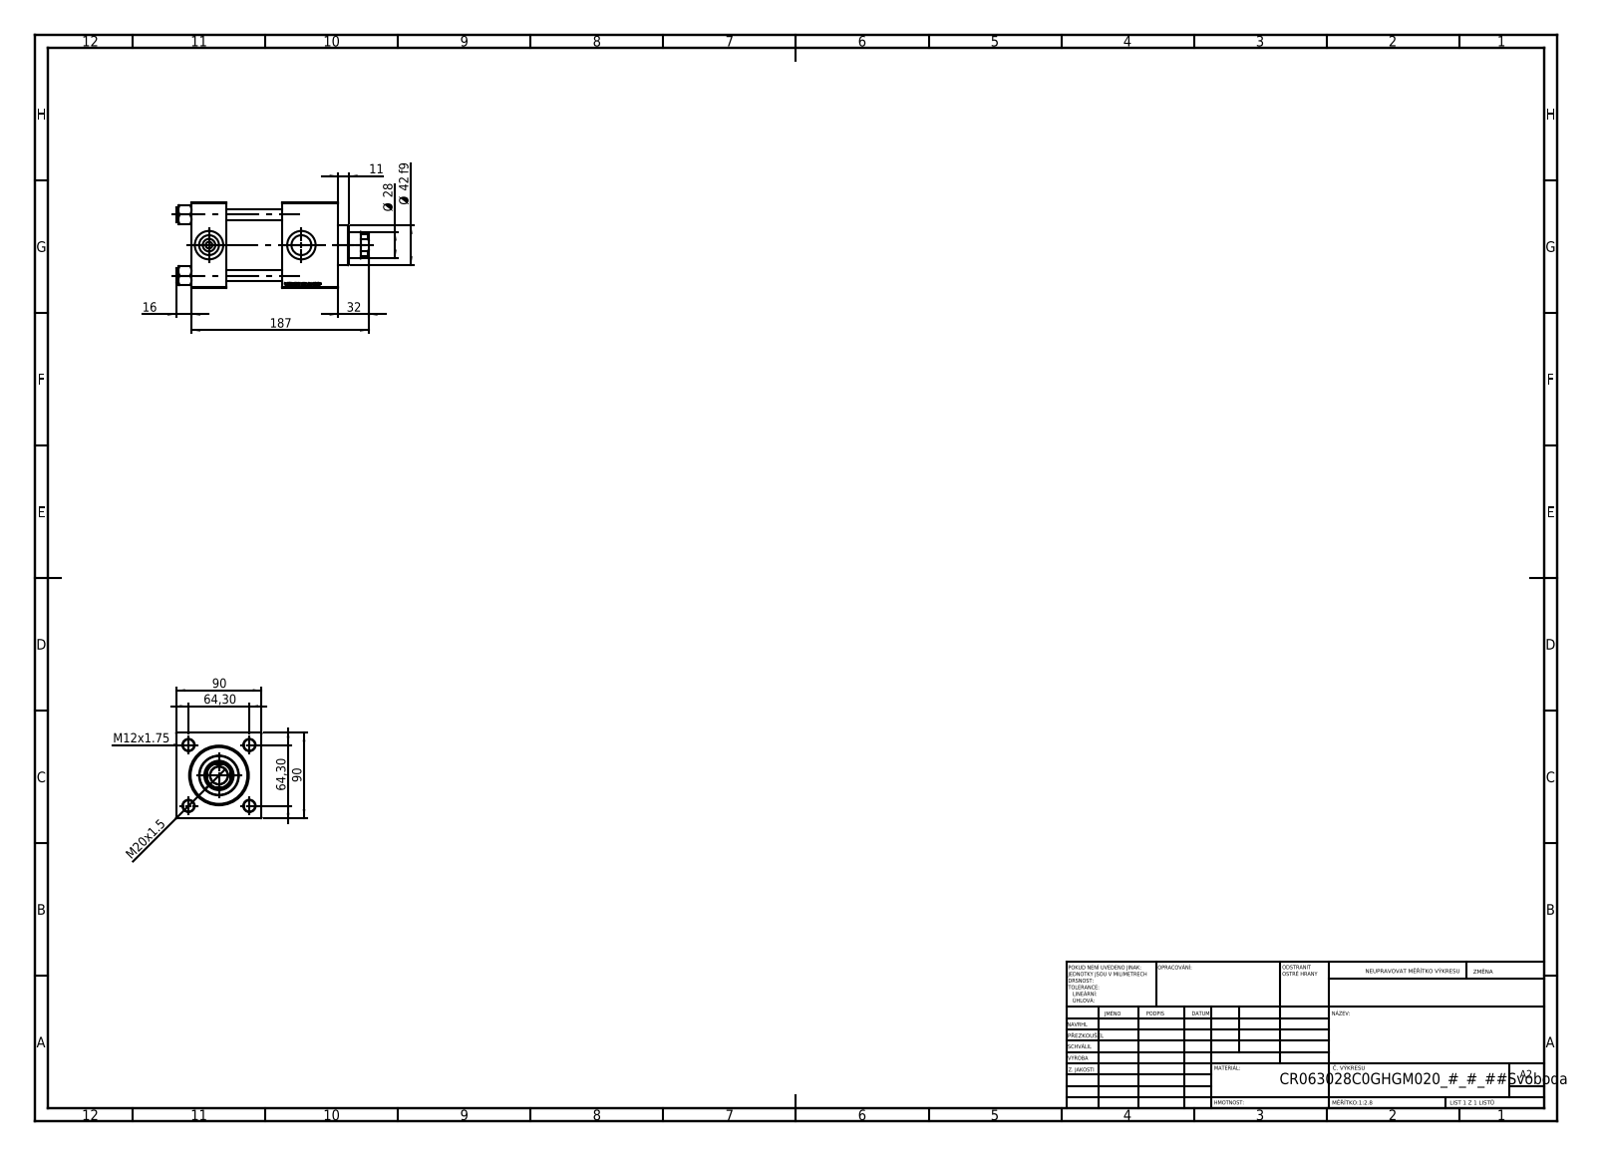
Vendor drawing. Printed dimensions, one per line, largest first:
187
90
90
64,30
64,30
Ø 42 f9
32
Ø 28
M20x1.5
16
M12x1.75
11
